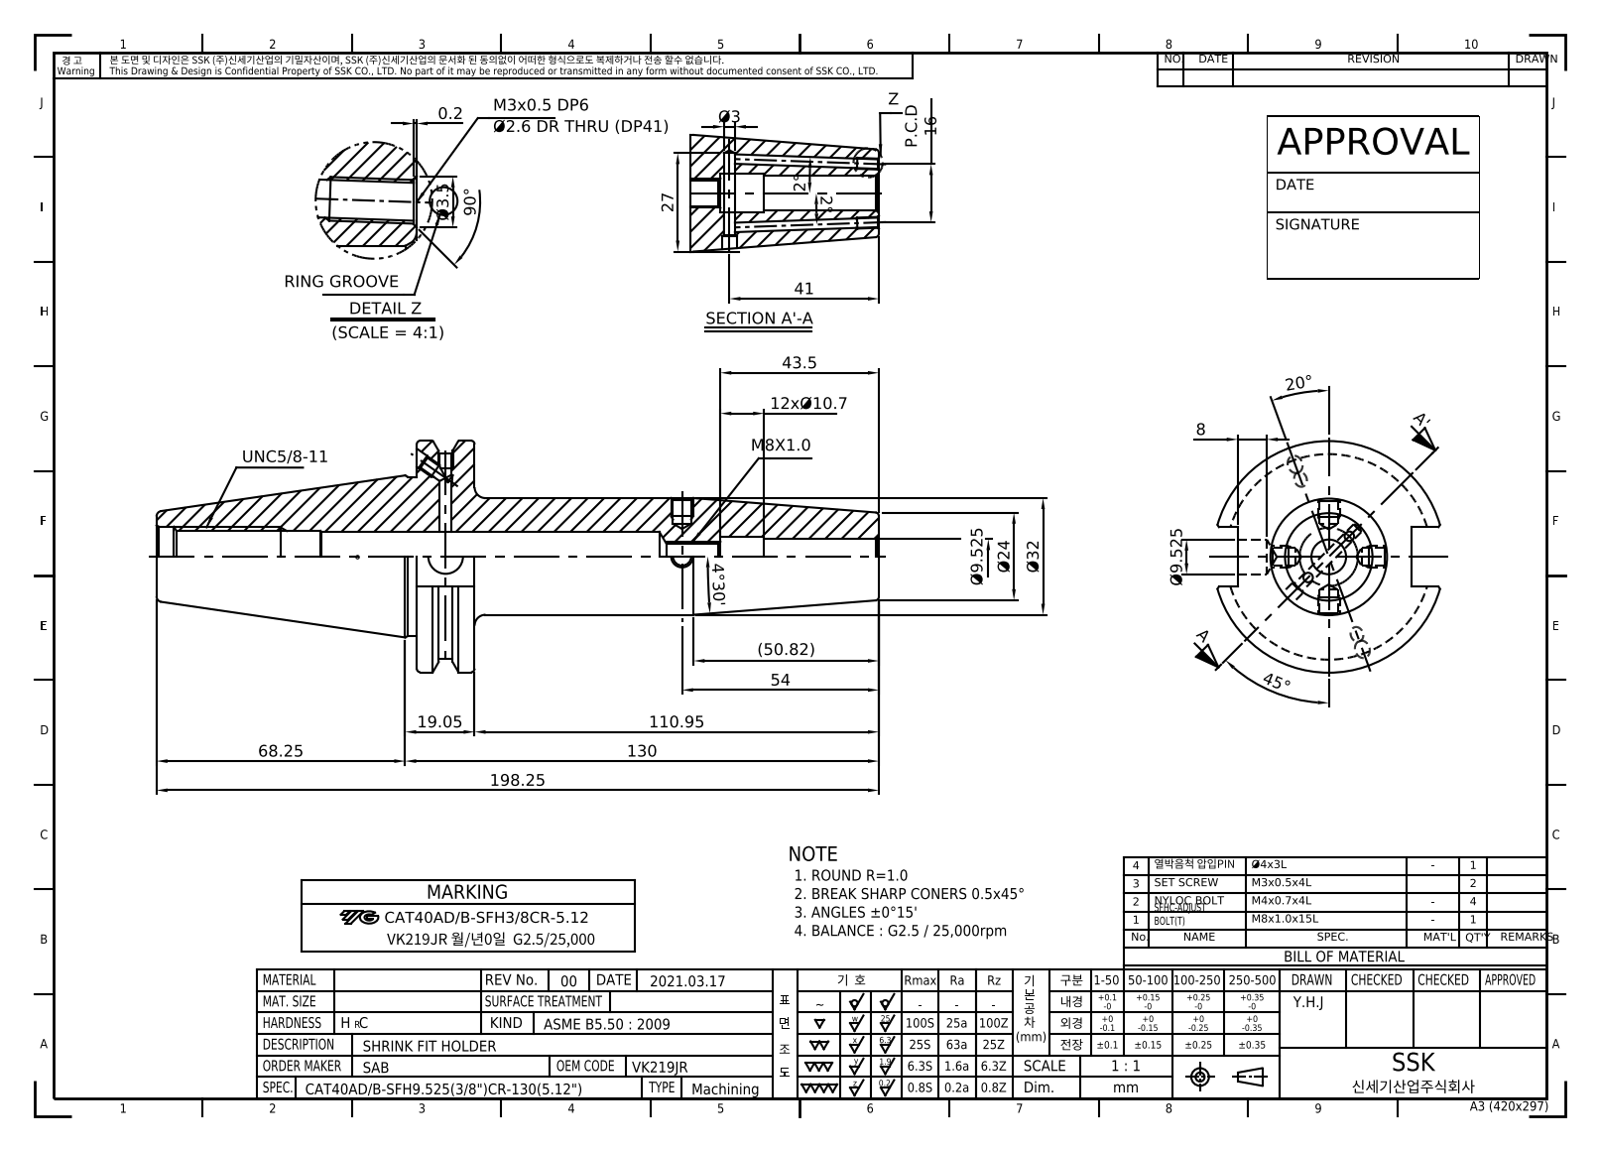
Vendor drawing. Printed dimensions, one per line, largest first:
198.25
130
110.95
90°
68.25
54
(50.82)
45°
43.5
41
Ø32
27
Ø24
20°
19.05
P.C.D 16
12xØ10.7
Ø9.525
Ø9.525
8
4°30'
Ø3.5
Ø3
2°
2°
0.2
